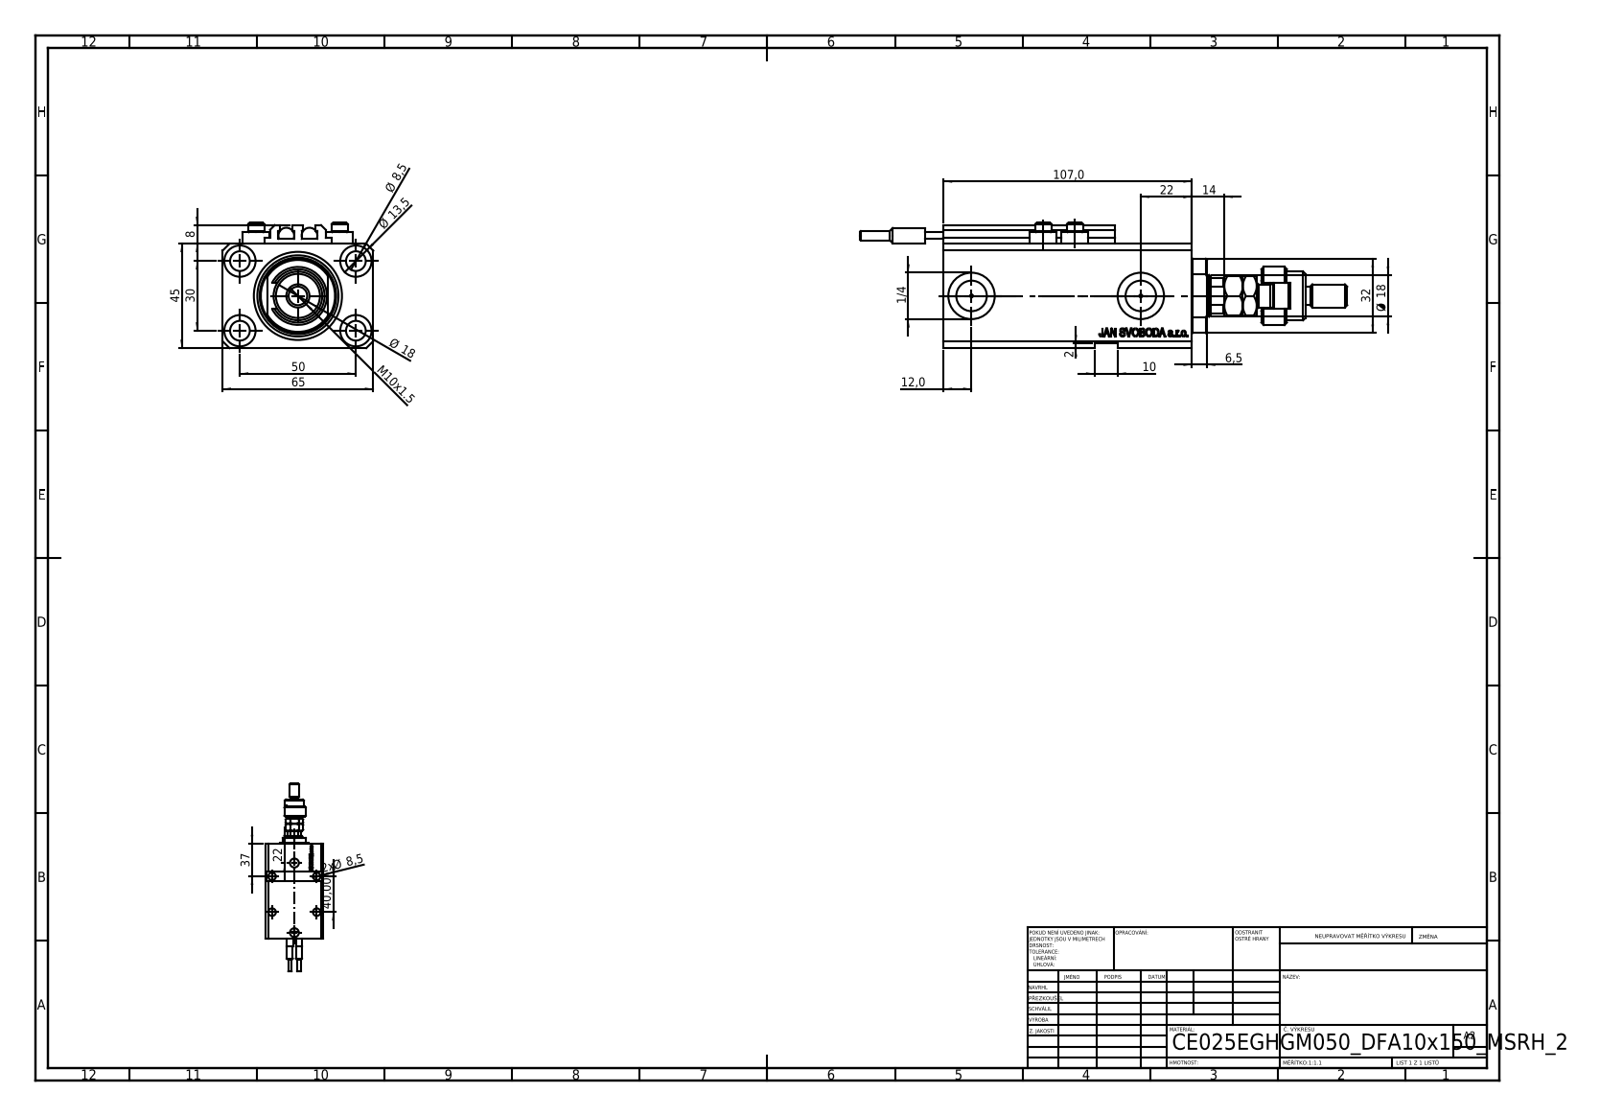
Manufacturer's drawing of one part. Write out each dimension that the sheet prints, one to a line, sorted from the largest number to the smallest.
107,0
65
50
45
40,00
37
32
30
22
22
Ø 18
Ø 18
14
Ø 13,5
12,0
M10x1.5
10
Ø 8,5
2x Ø 8,5
8
6,5
2
1/4
